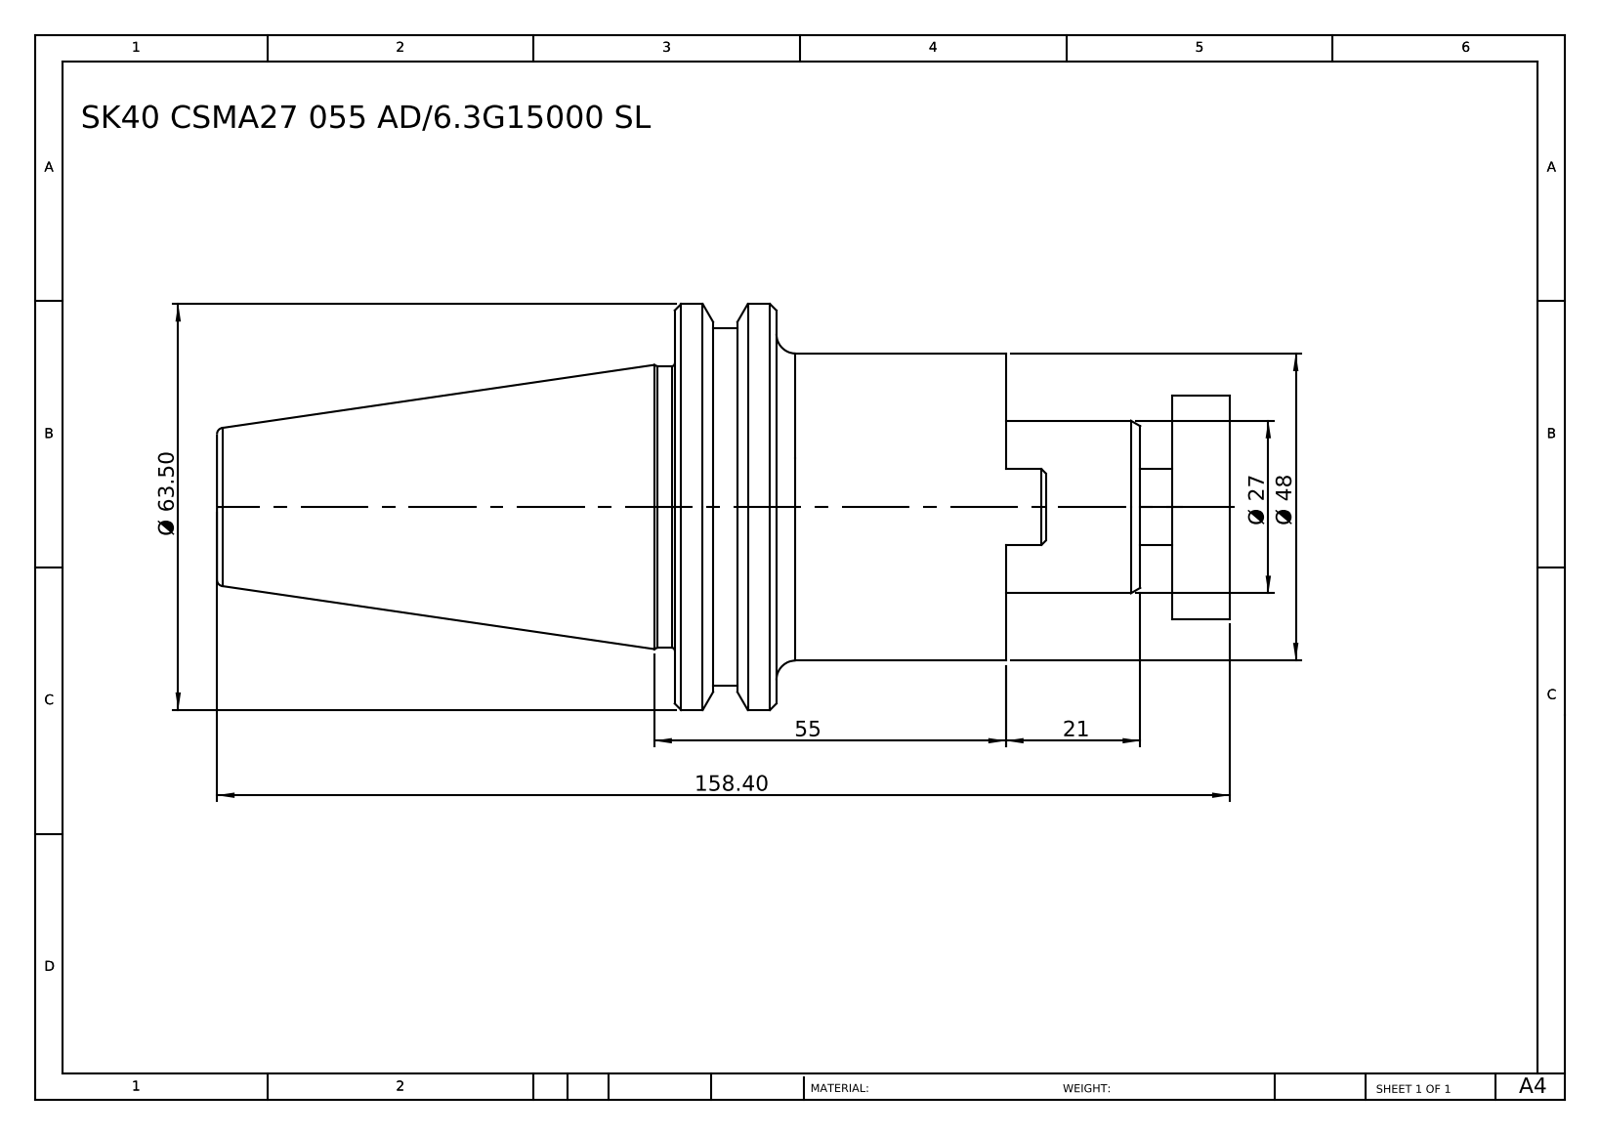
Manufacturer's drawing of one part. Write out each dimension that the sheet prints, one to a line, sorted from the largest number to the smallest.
158.40
Ø 63.50
55
Ø 48
Ø 27
21
